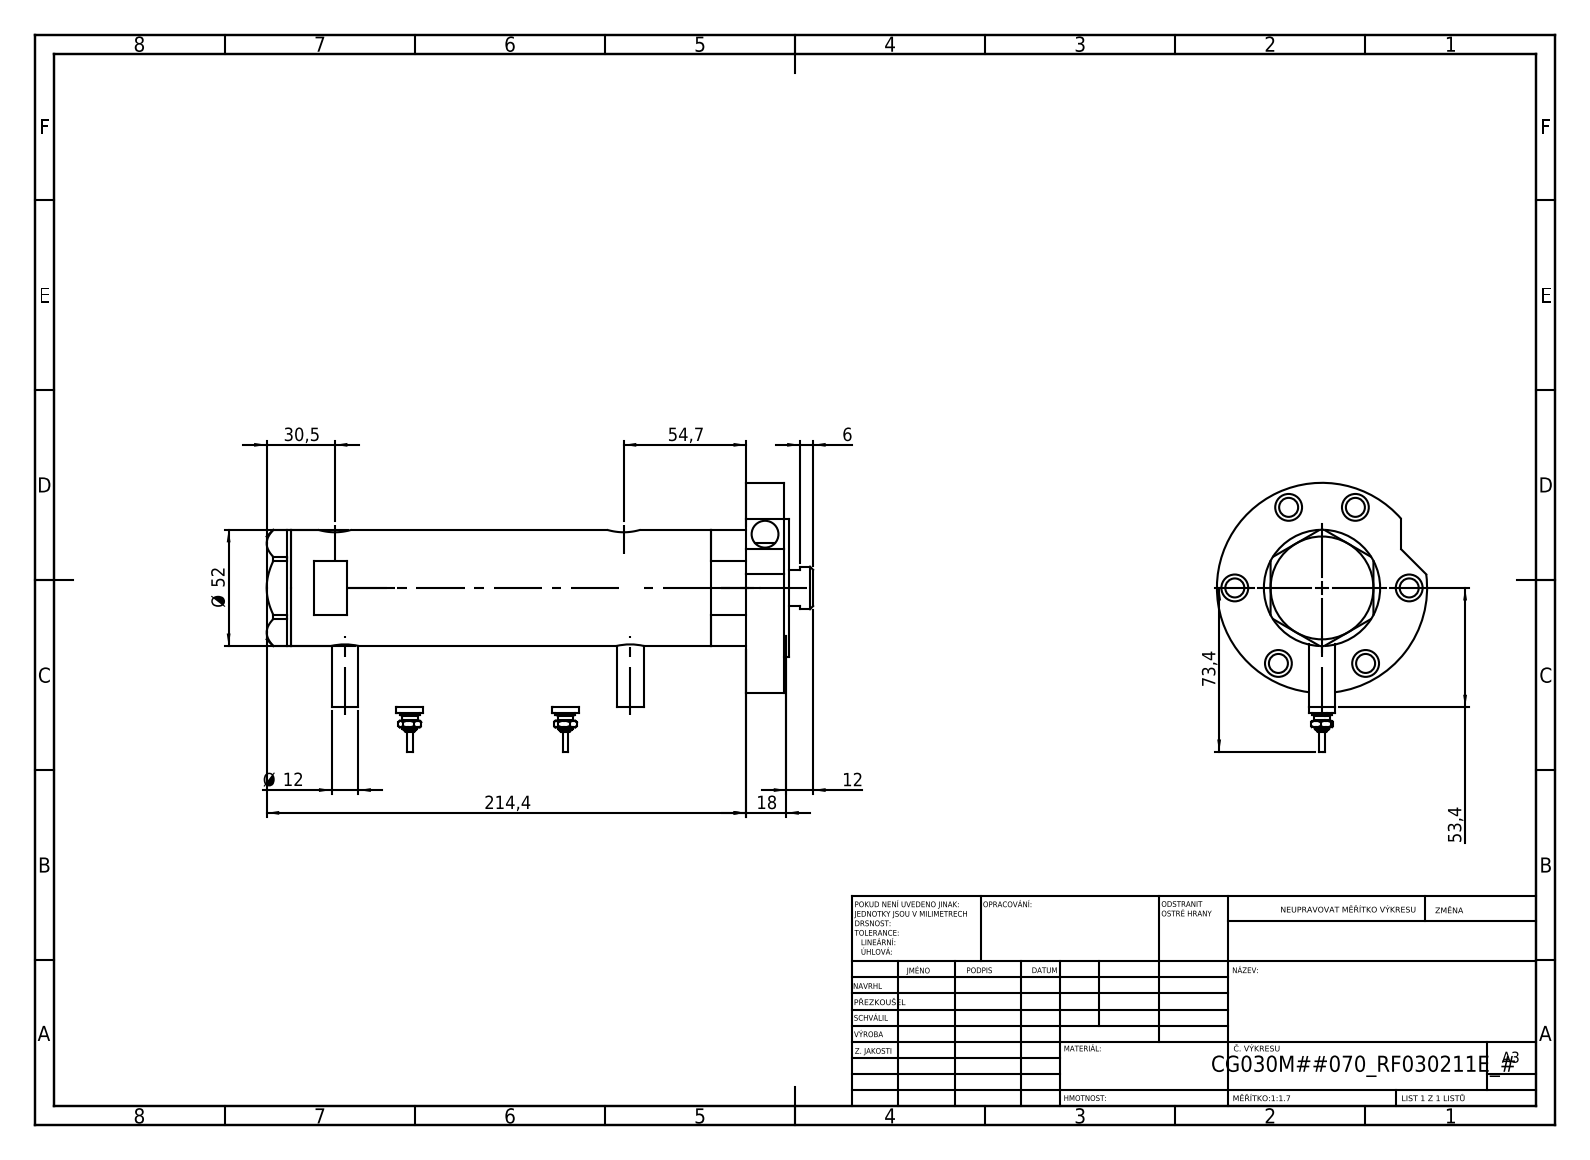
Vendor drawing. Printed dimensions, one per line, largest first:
214,4
73,4
54,7
53,4
Ø 52
30,5
18
12
Ø 12
6
